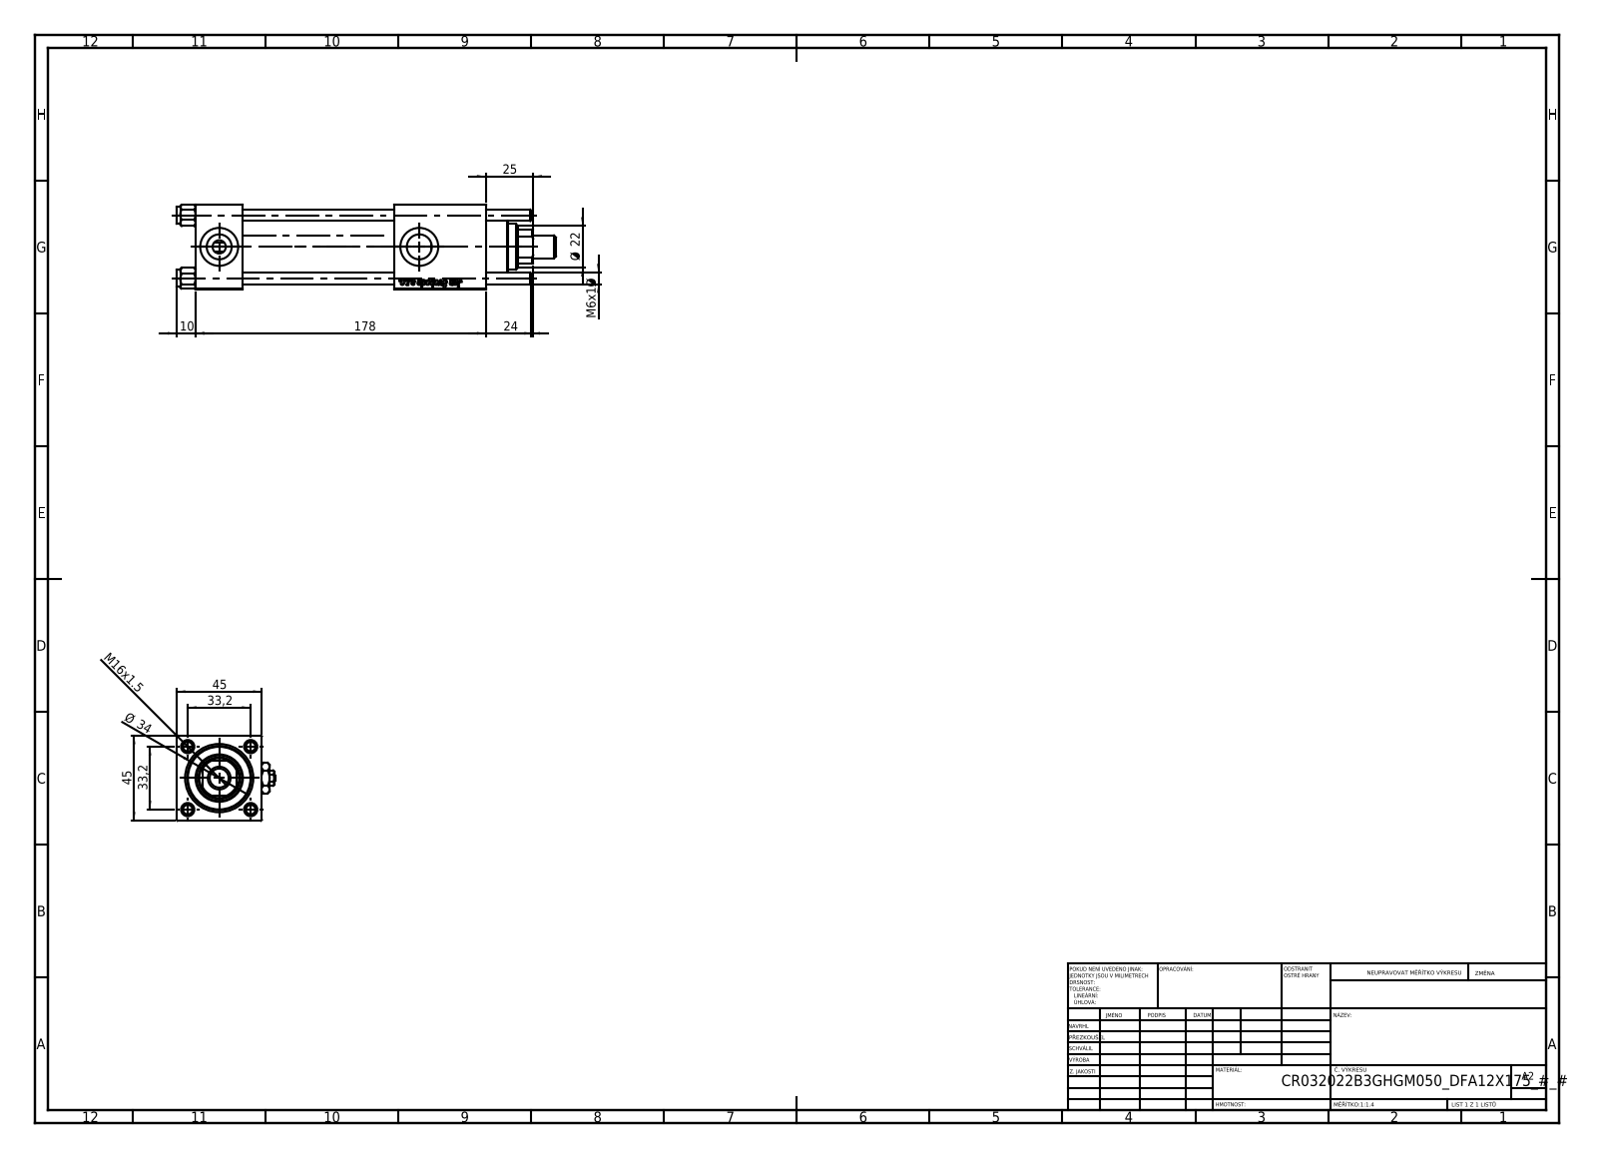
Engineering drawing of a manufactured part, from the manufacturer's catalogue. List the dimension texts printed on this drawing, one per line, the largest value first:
178
45
45
Ø 34
33,2
33,2
25
24
Ø 22
M16x1.5
10
M6x1 Ø
